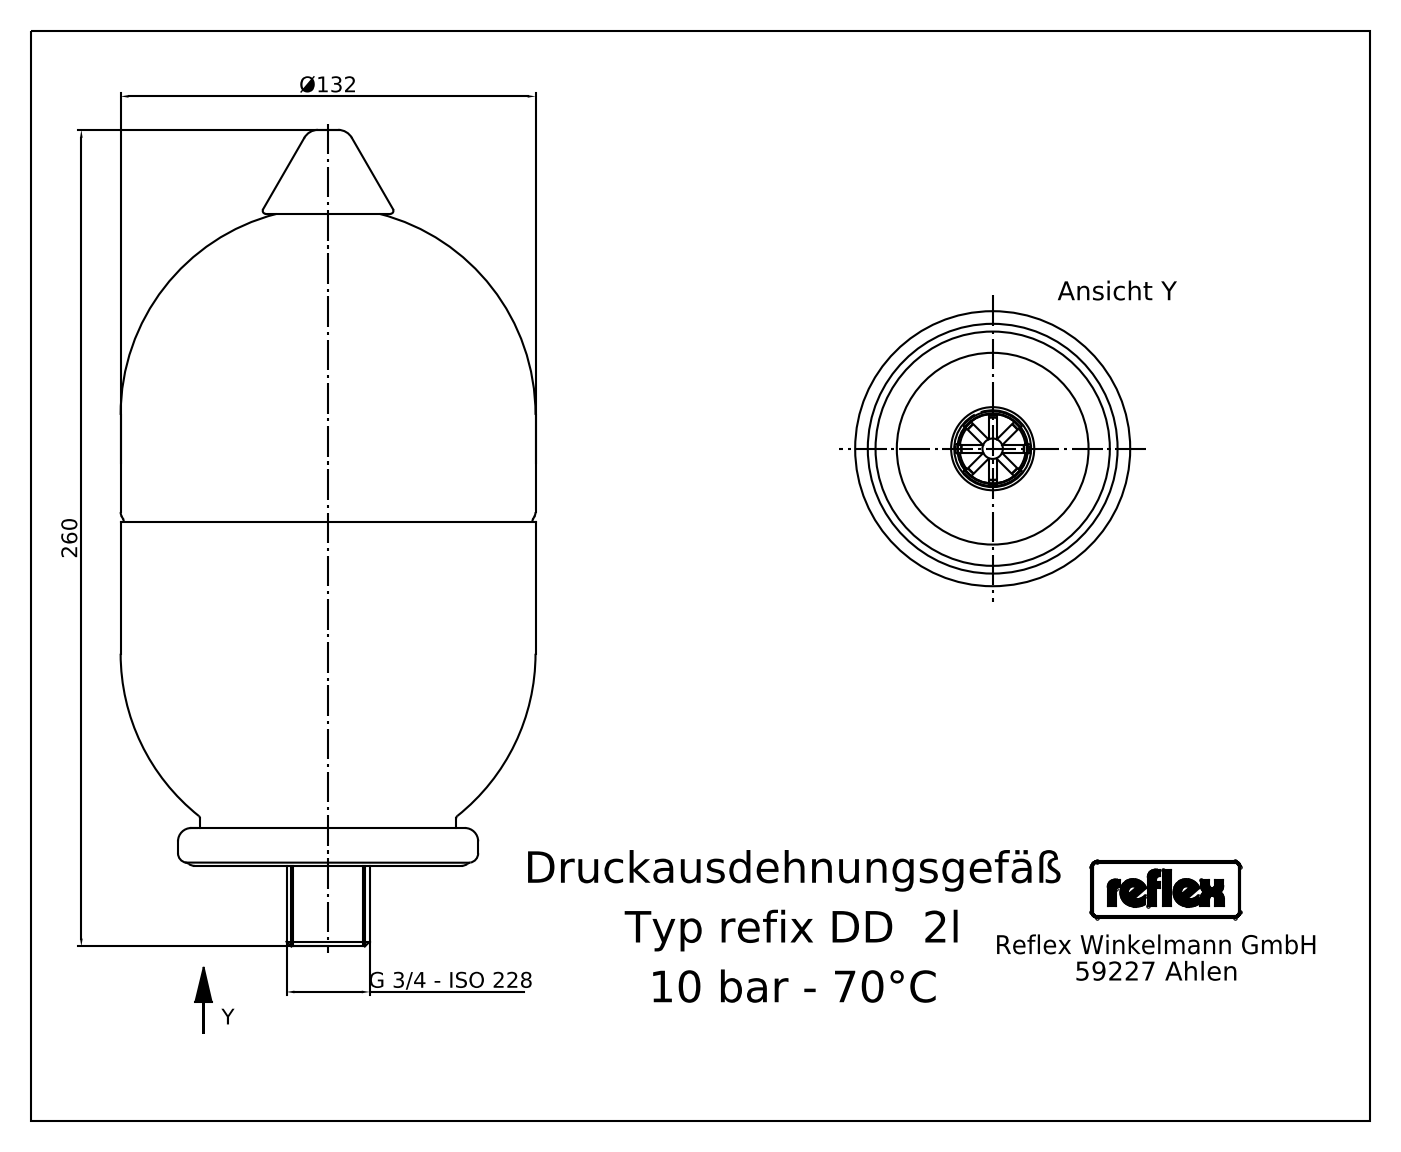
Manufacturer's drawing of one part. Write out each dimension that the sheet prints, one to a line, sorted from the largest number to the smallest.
260
Ø132
G 3/4 - ISO 228
